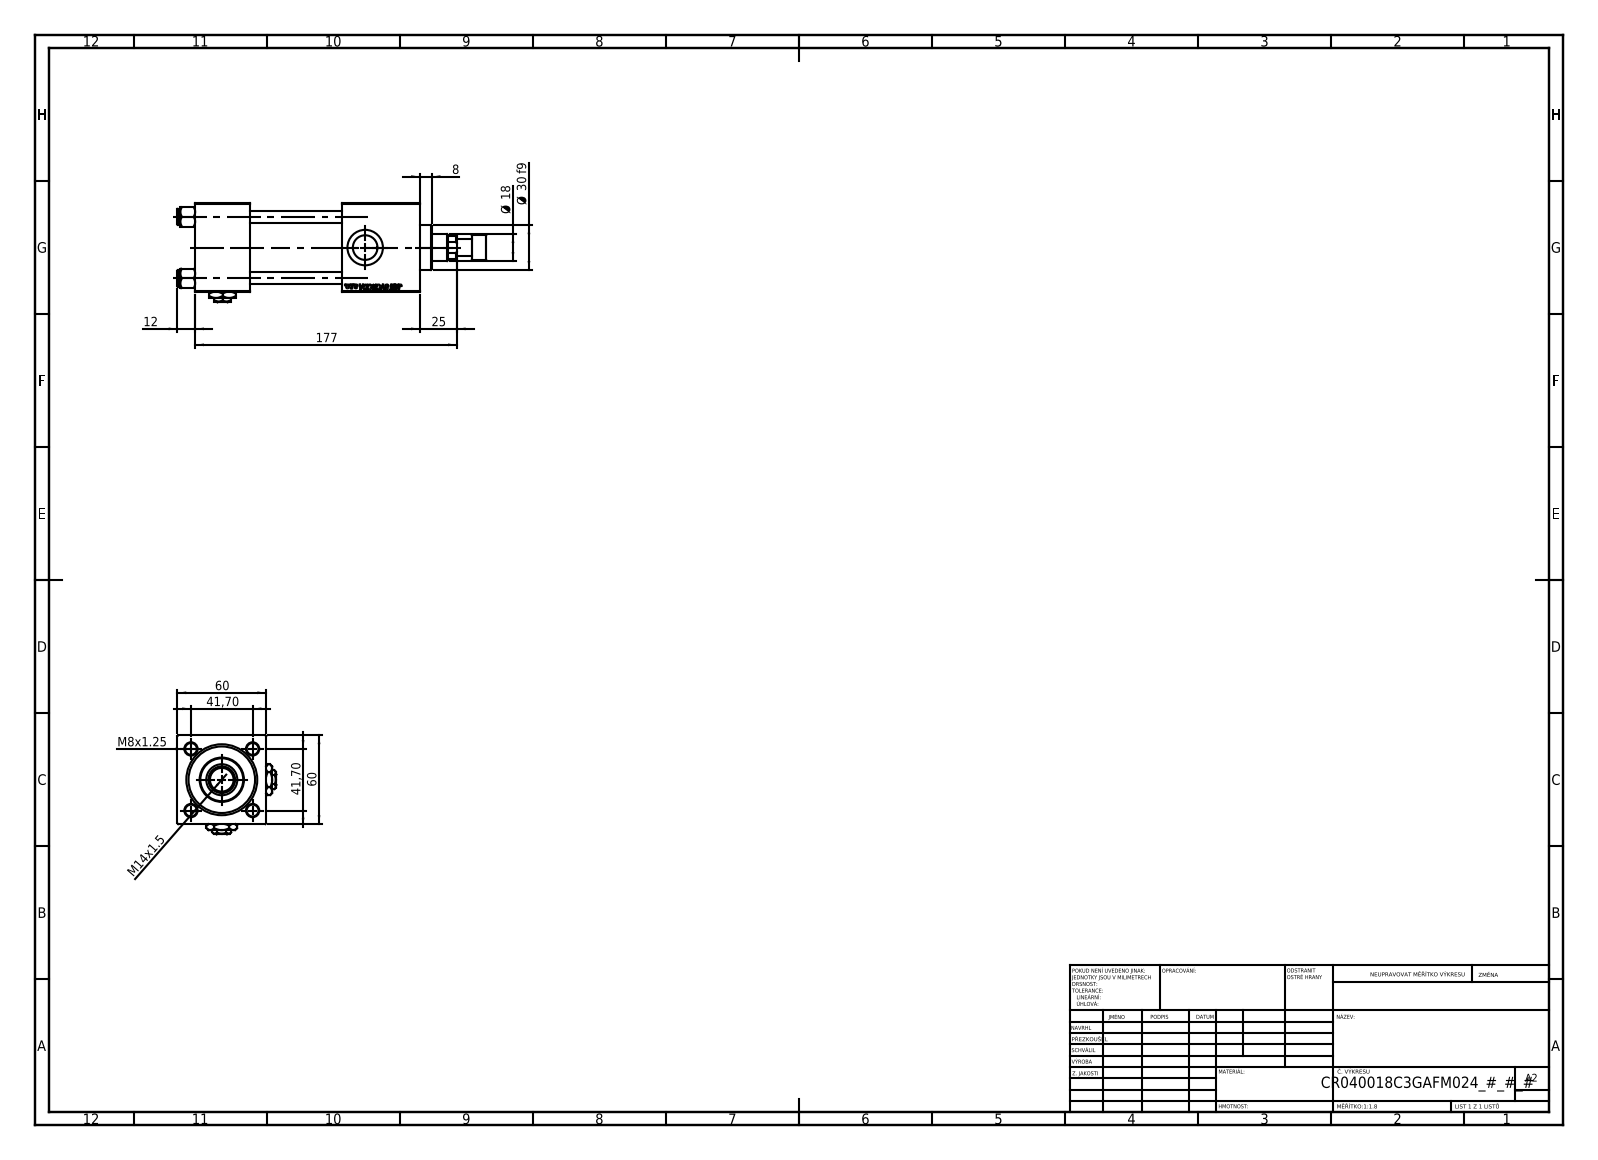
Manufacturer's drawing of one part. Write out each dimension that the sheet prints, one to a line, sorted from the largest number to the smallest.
177
60
60
41,70
41,70
Ø 30 f9
25
Ø 18
M14x1.5
12
8
M8x1.25
